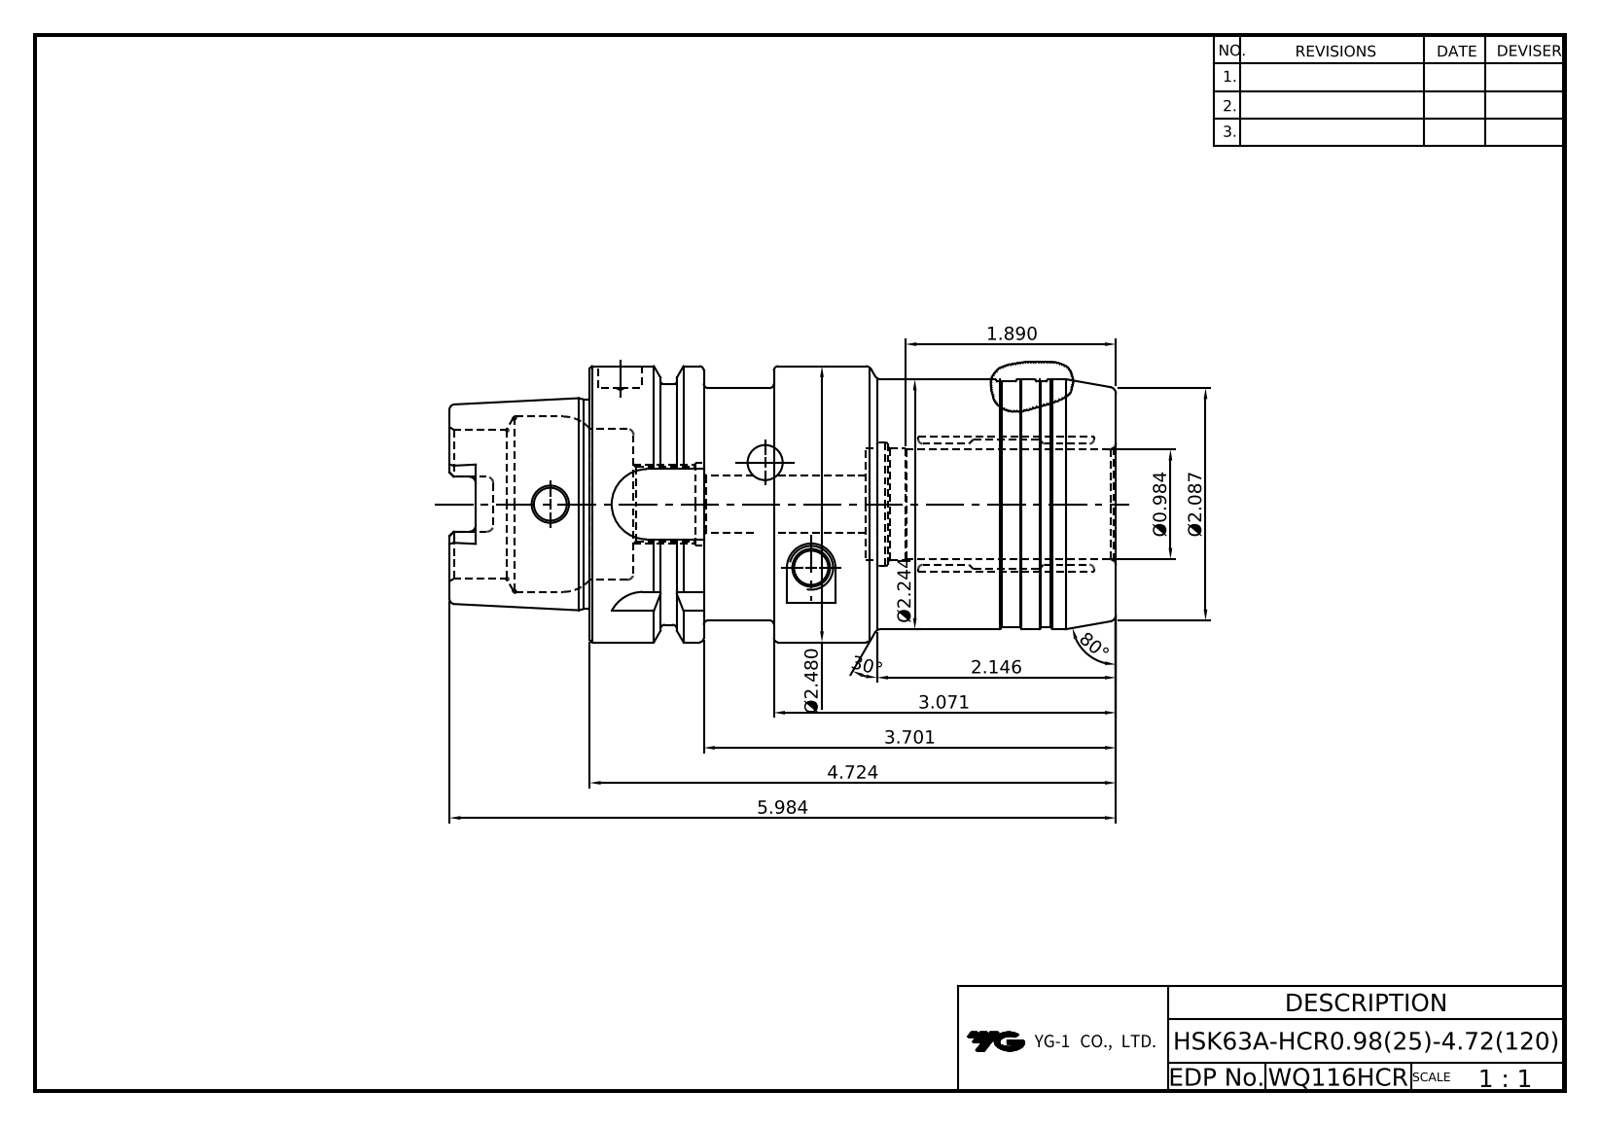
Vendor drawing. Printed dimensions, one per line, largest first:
80°
30°
5.984
4.724
3.701
3.071
Ø2.480
Ø2.244
2.146
Ø2.087
1.890
Ø0.984
